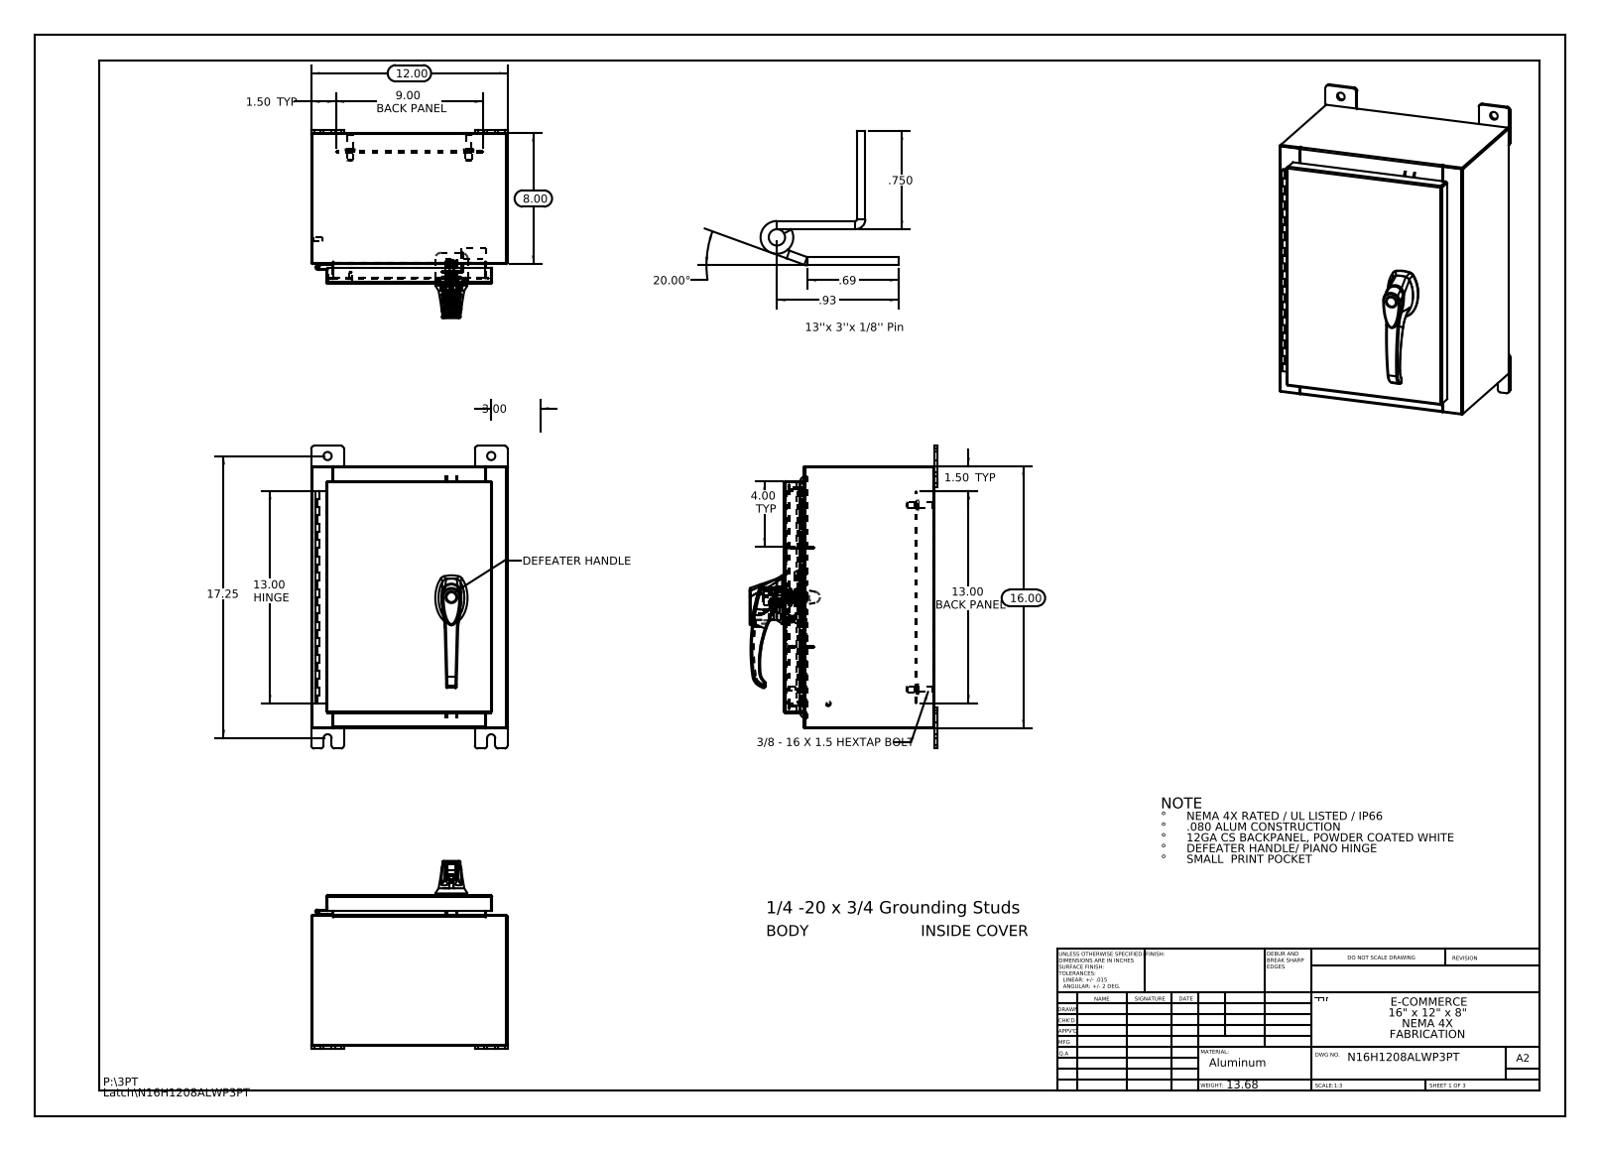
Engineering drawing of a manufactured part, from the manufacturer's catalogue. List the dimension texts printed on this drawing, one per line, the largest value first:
20.00°
17.25
16.00
13.00 HINGE
13.00 BACK PANEL
12.00
9.00 BACK PANEL
8.00
4.00 TYP
3.00
1.50 TYP
1.50 TYP
.93
.750
.69
